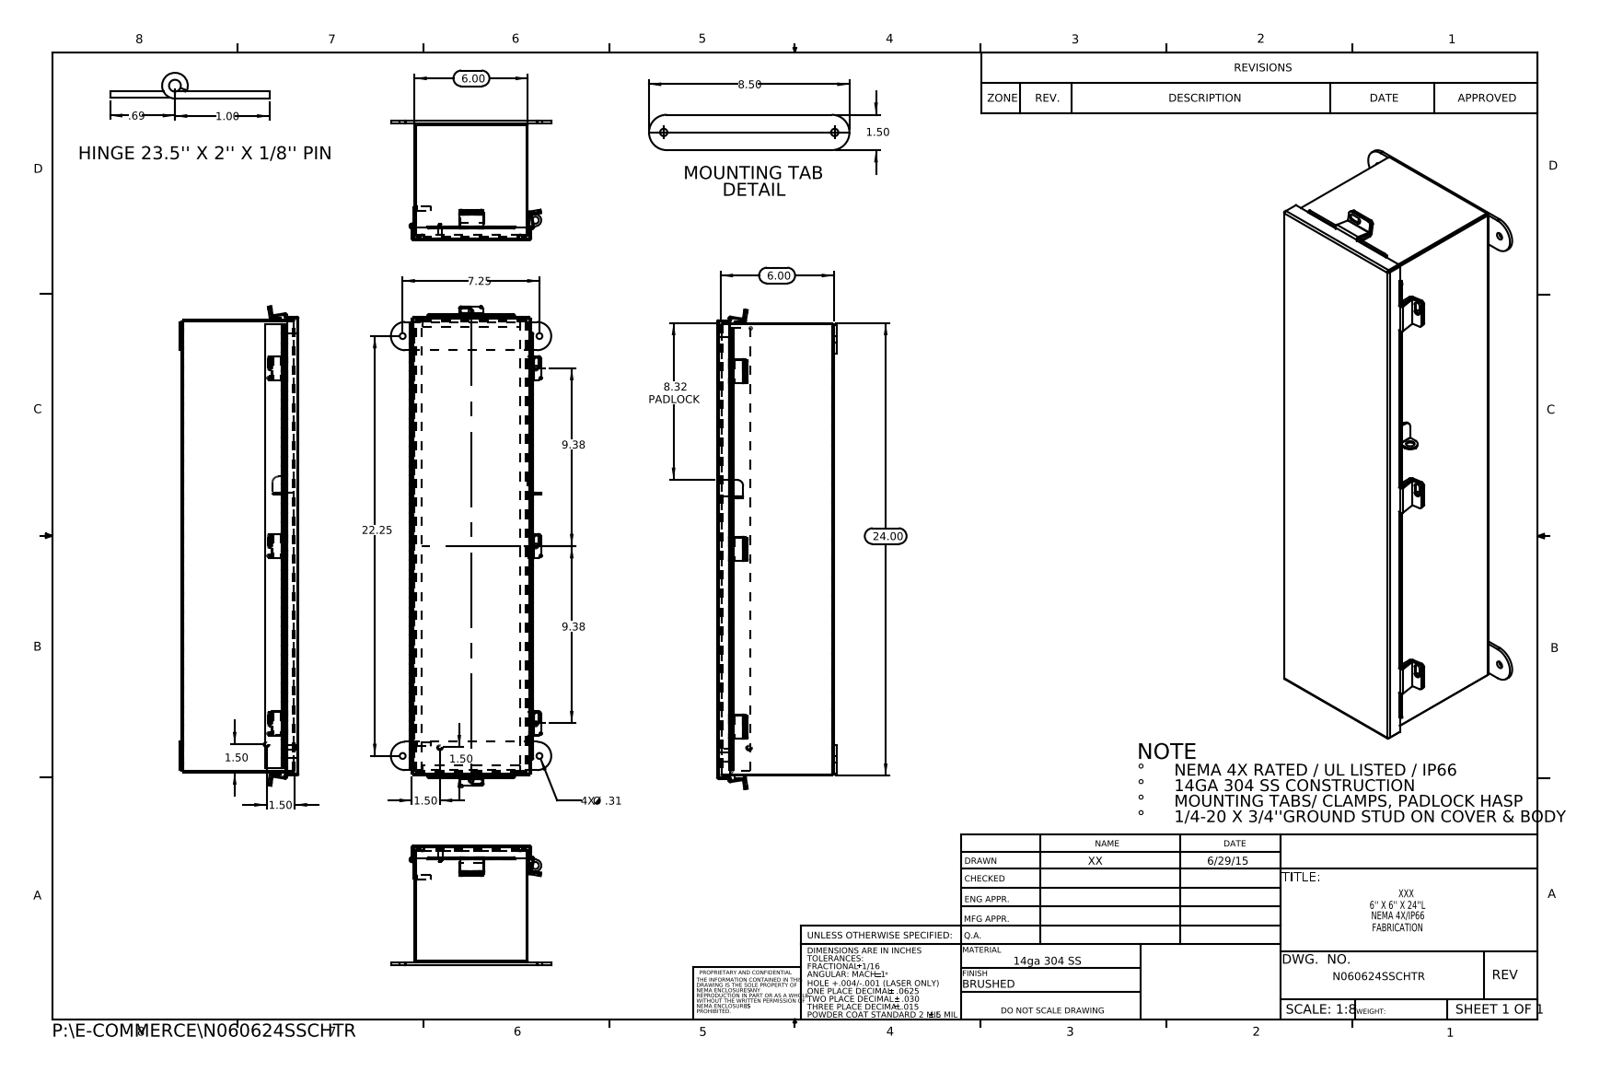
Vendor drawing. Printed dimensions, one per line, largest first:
24.00
22.25
9.38
9.38
8.50
8.32 PADLOCK
7.25
6.00
6.00
1.50
1.50
1.50
1.50
1.50
1.00
.69
4X Ø .31
